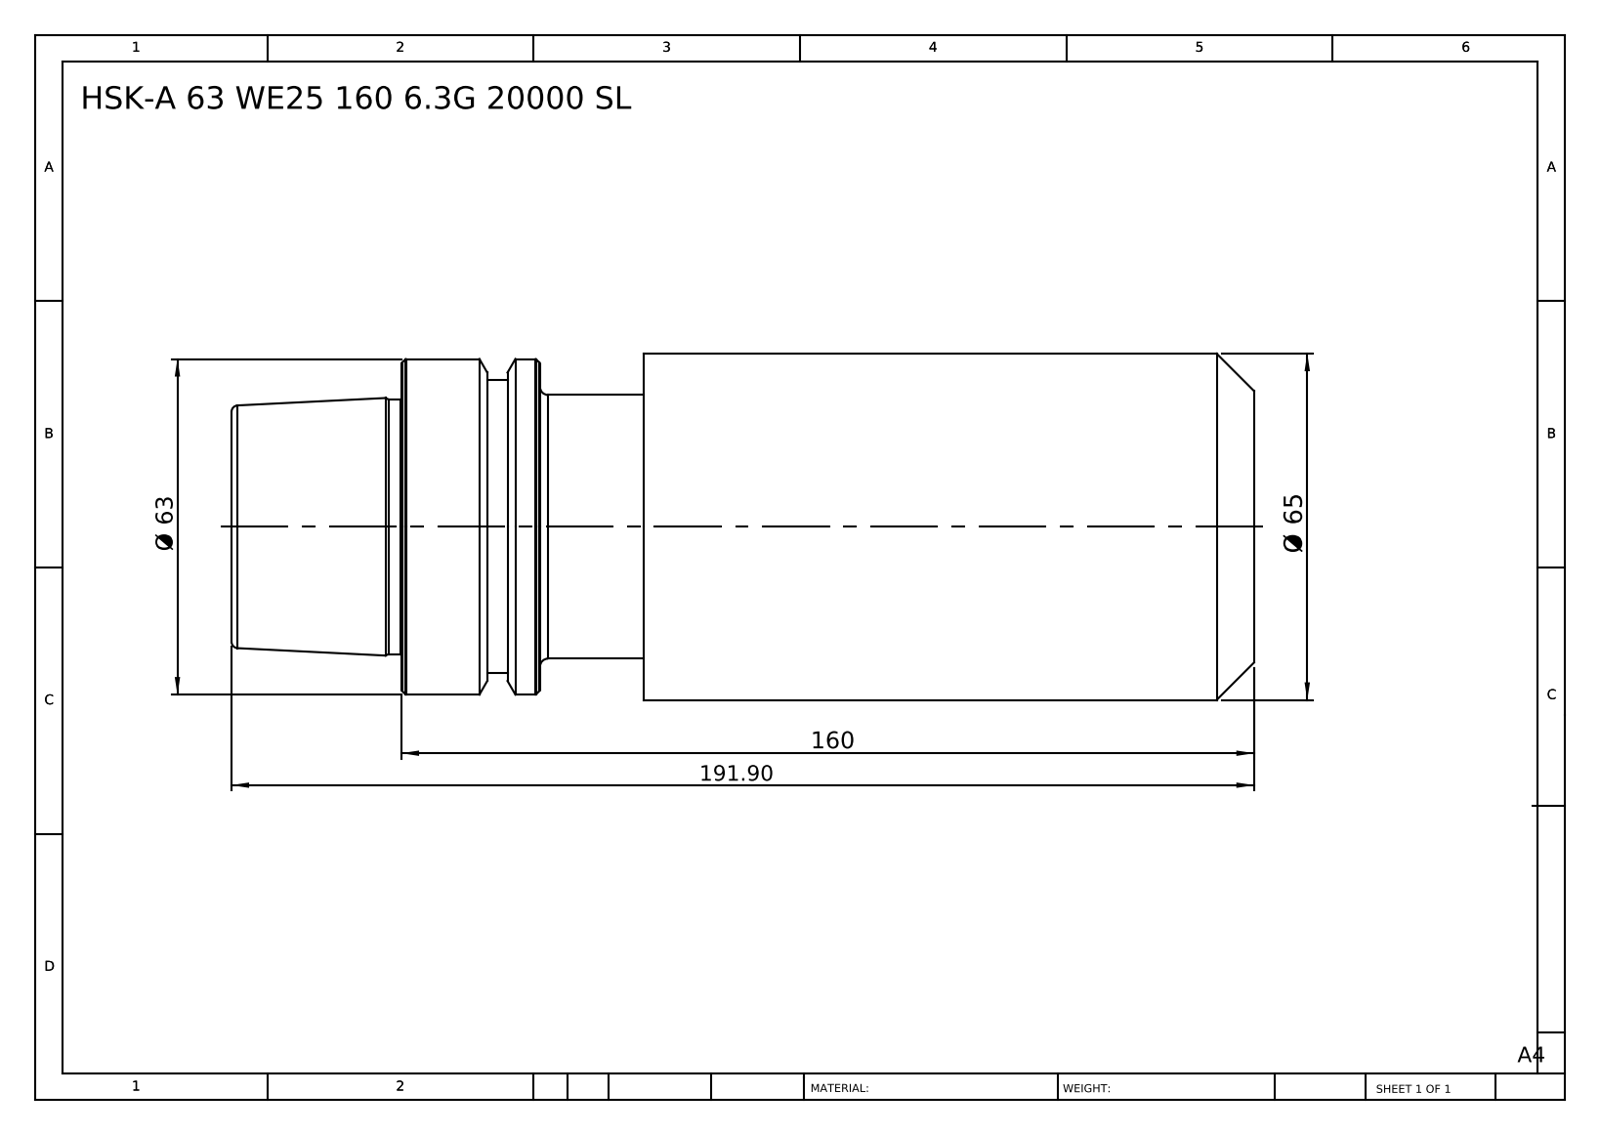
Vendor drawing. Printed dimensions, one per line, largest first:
191.90
160
Ø 65
Ø 63
